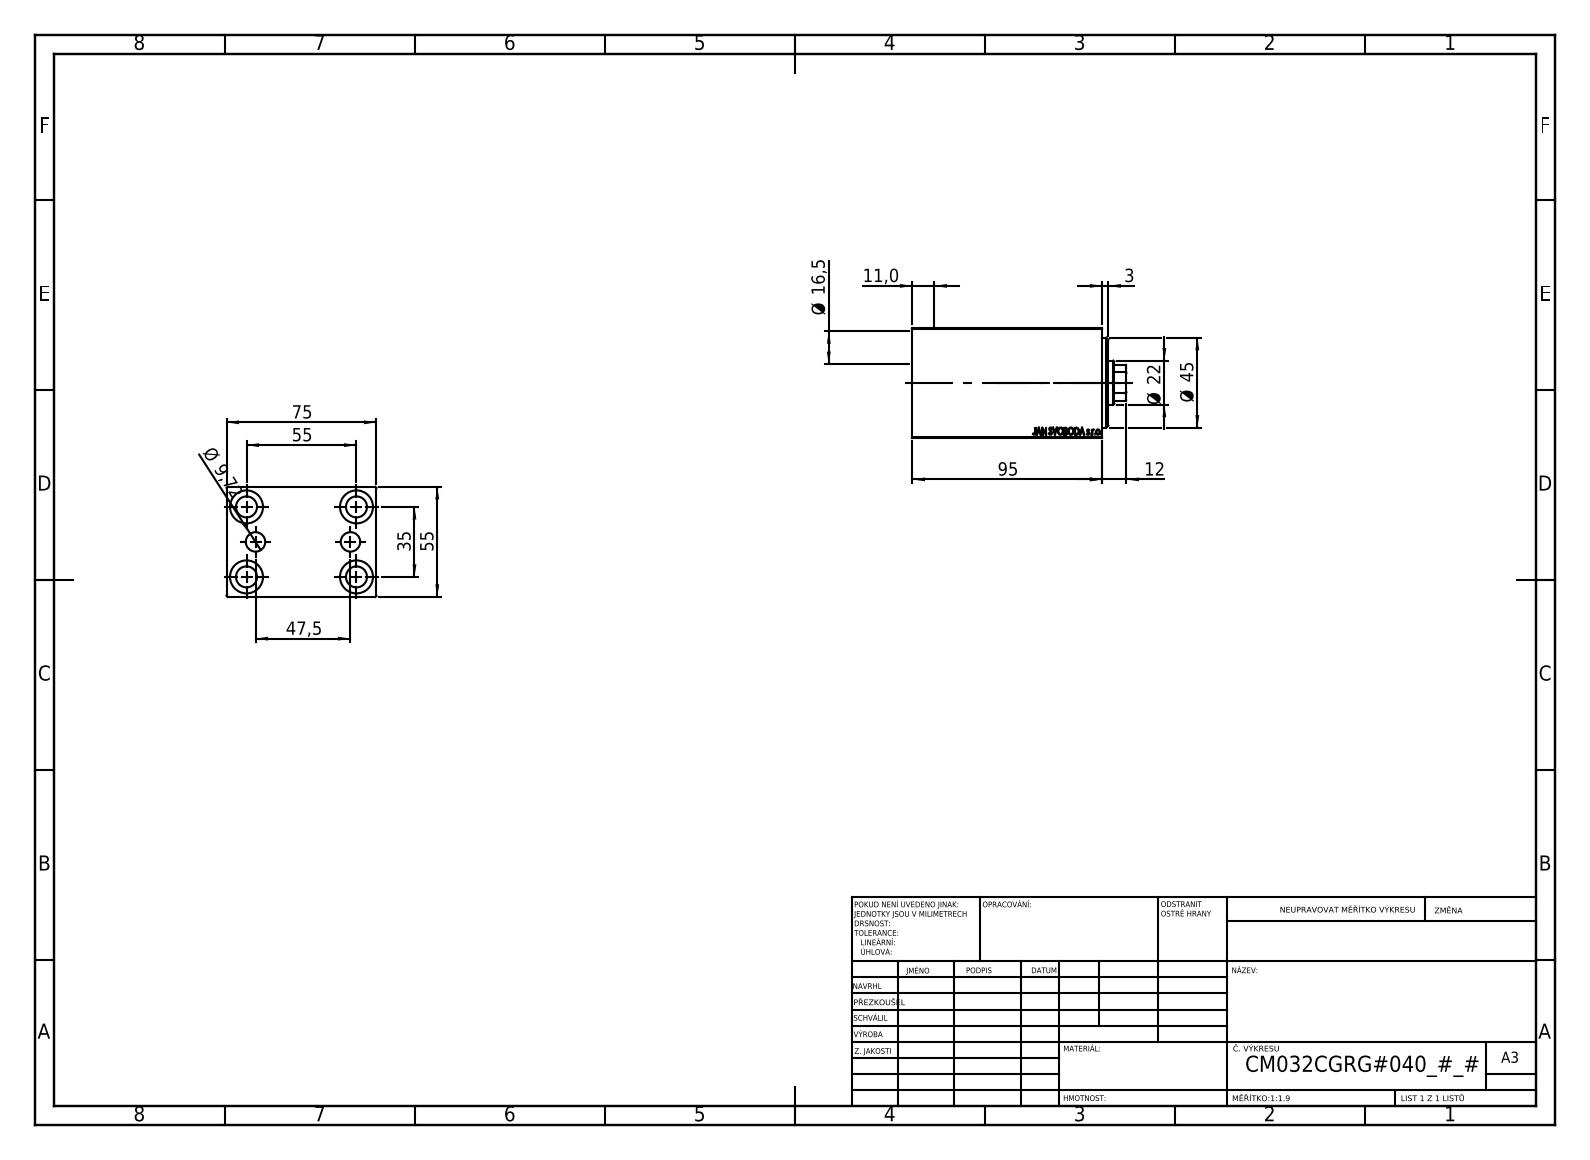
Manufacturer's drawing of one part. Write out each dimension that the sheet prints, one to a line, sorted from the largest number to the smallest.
95
75
55
55
47,5
Ø 45
35
Ø 22
Ø 16,5
12
11,0
Ø 9,72
3
